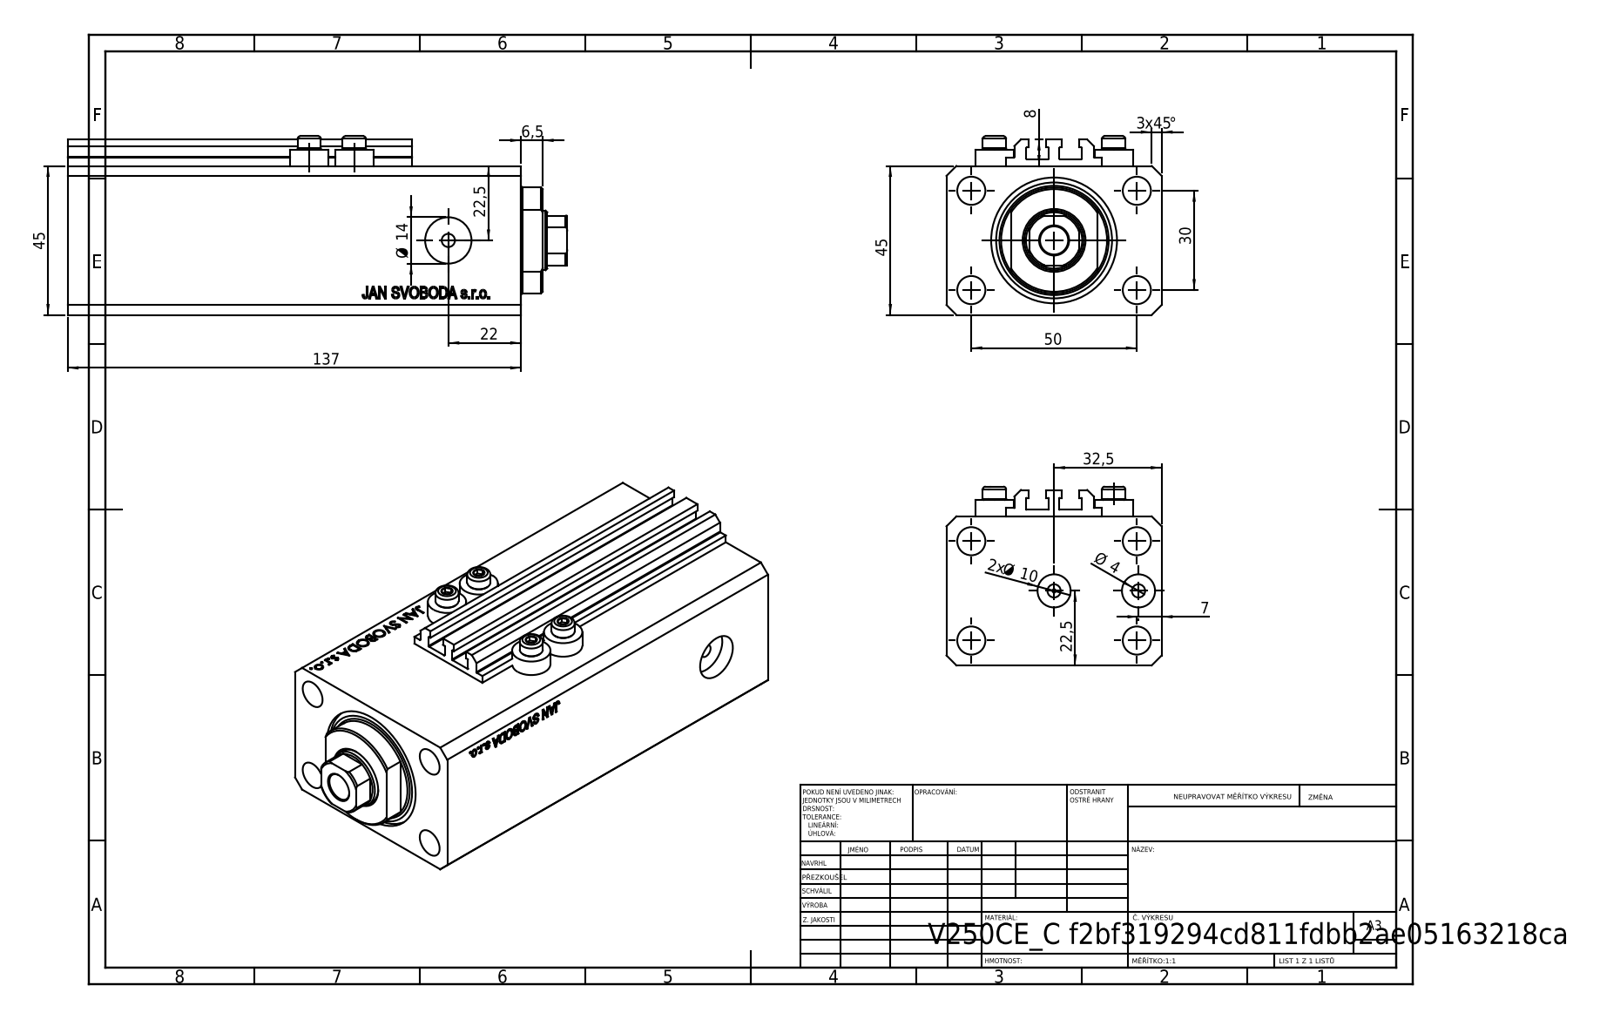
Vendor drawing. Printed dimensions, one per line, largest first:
137
50
45
3 x45 °
45
32,5
30
22,5
22,5
22
Ø 14
2x Ø 10
8
7
6,5
Ø 4
